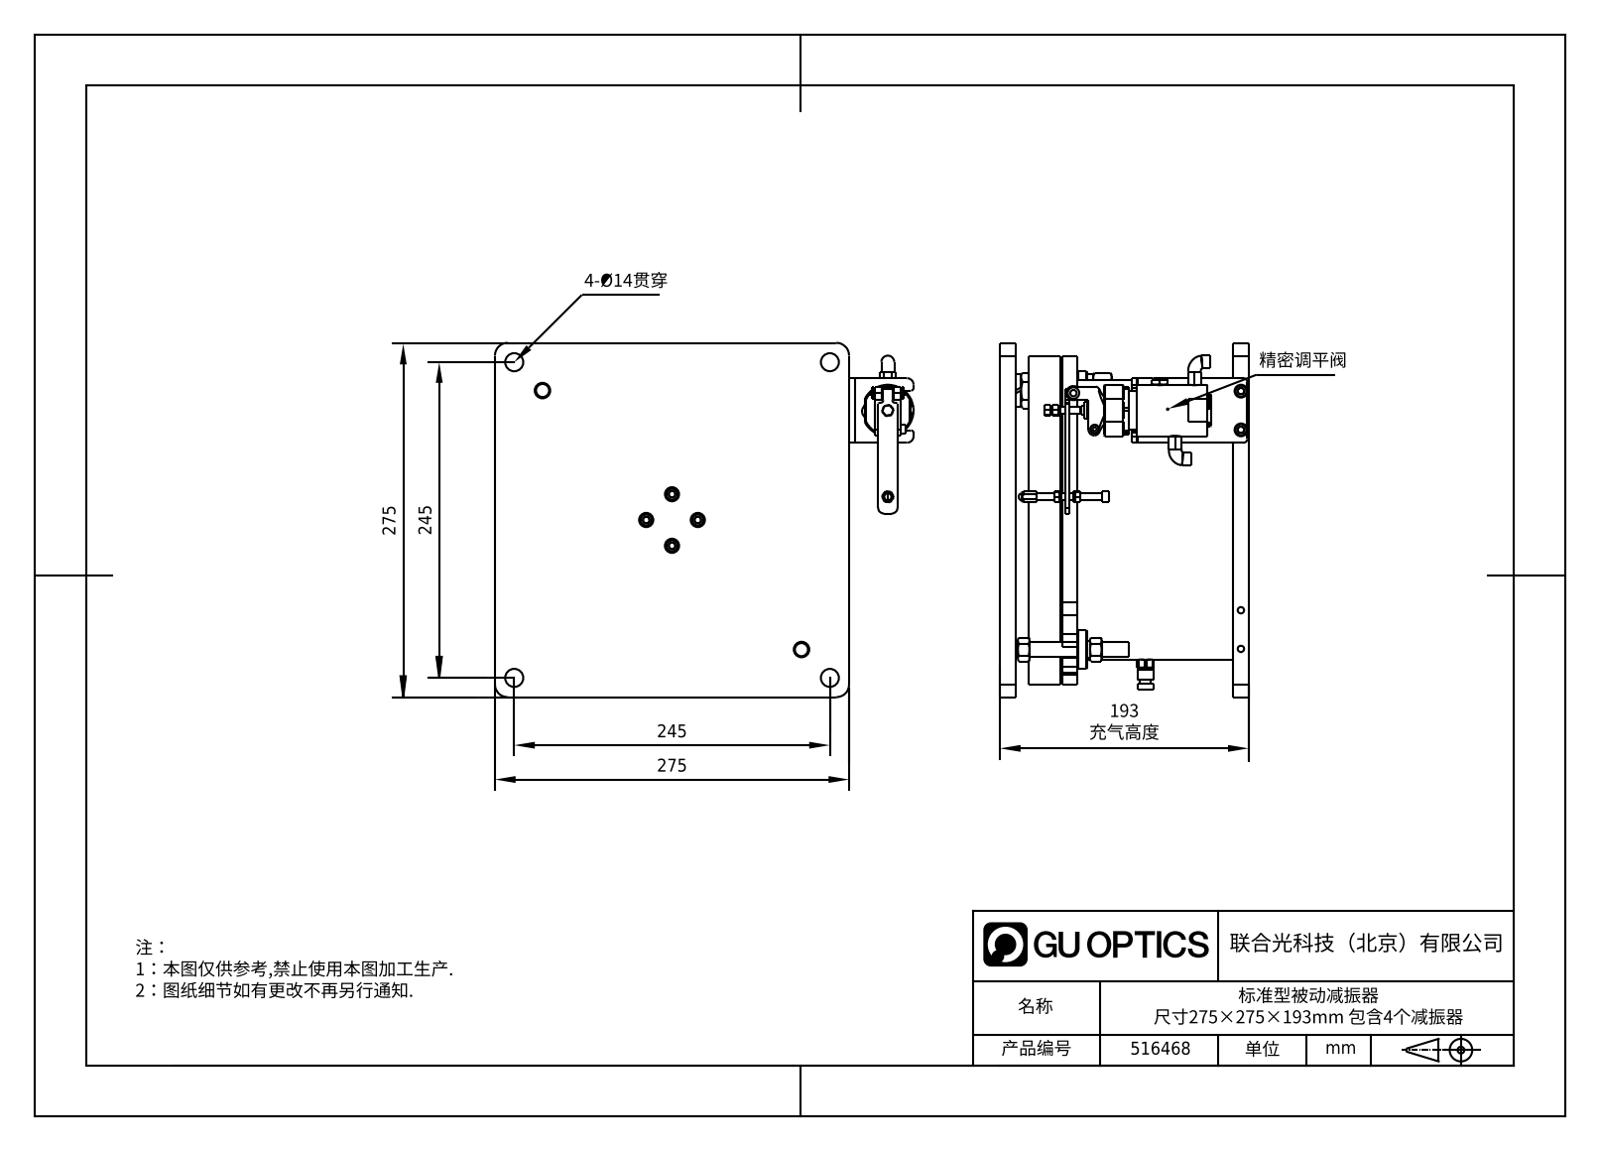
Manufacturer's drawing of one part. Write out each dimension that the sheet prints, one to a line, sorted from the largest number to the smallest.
275
275
245
245
193 充气高度
